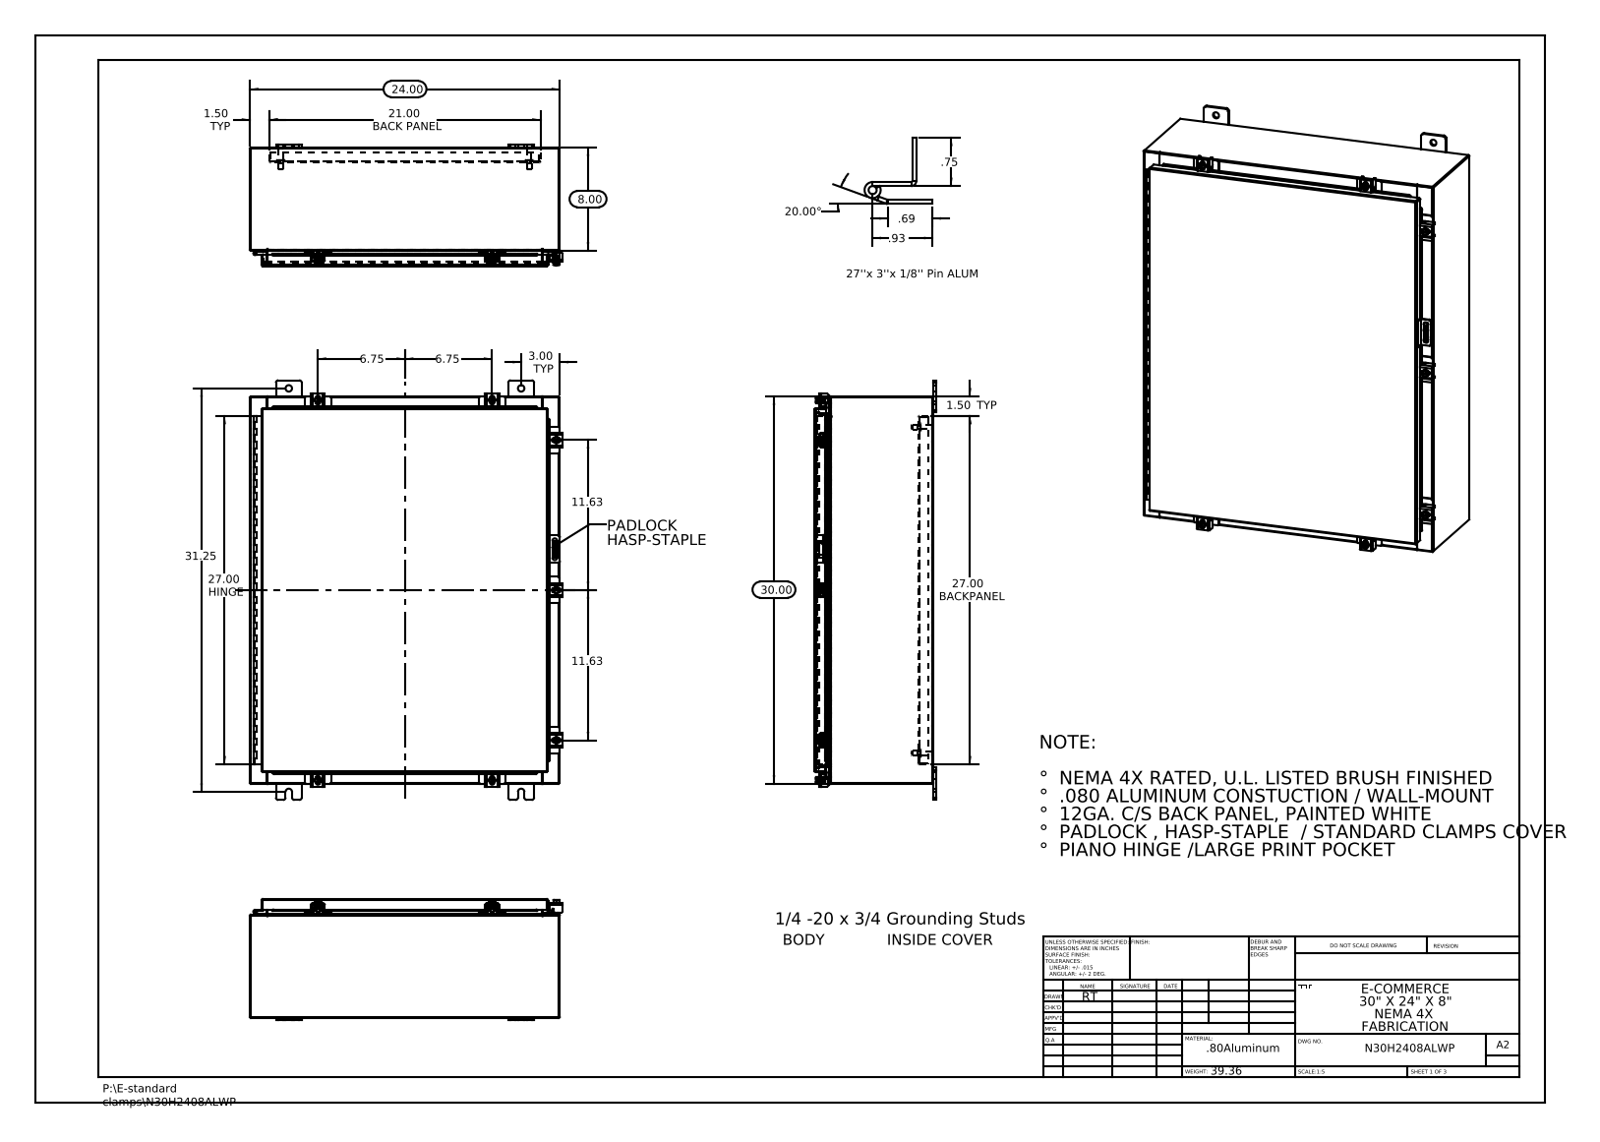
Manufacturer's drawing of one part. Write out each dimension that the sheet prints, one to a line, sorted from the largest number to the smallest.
31.25
30.00
27.00 HINGE
27.00 BACKPANEL
24.00
21.00 BACK PANEL
20.00°
11.63
11.63
8.00
6.75
6.75
3.00 TYP
1.50 TYP
1.50 TYP
.93
.75
.69
